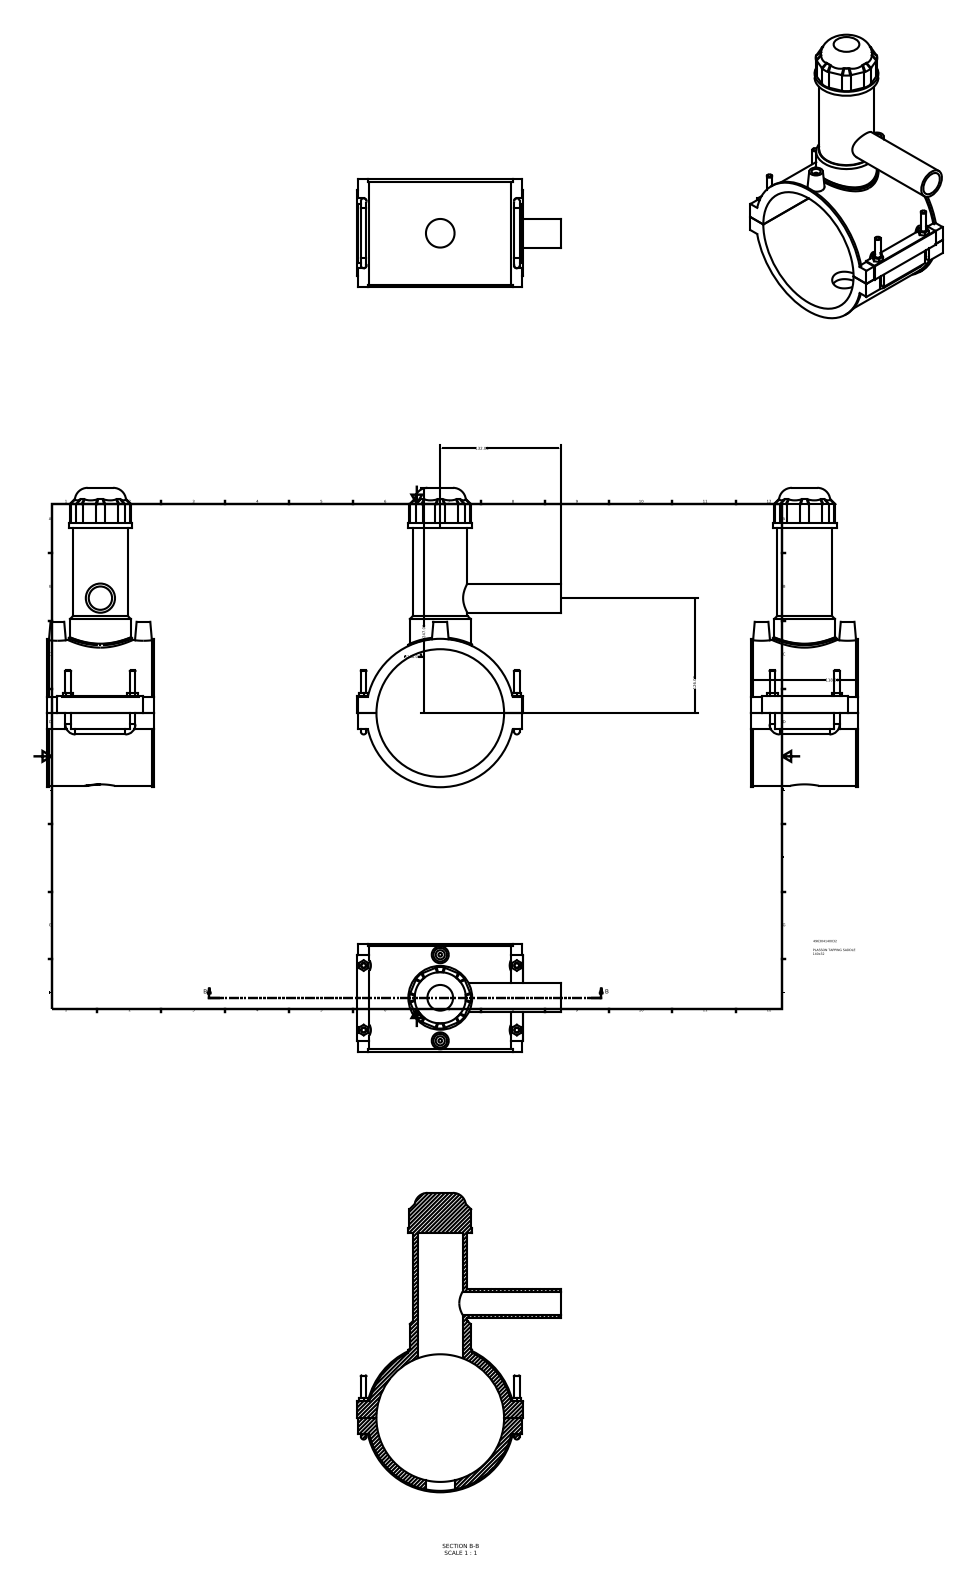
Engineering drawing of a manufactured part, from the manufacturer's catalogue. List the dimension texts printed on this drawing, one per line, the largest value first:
247.00
∅140.00
132.00
126.00
118.00
